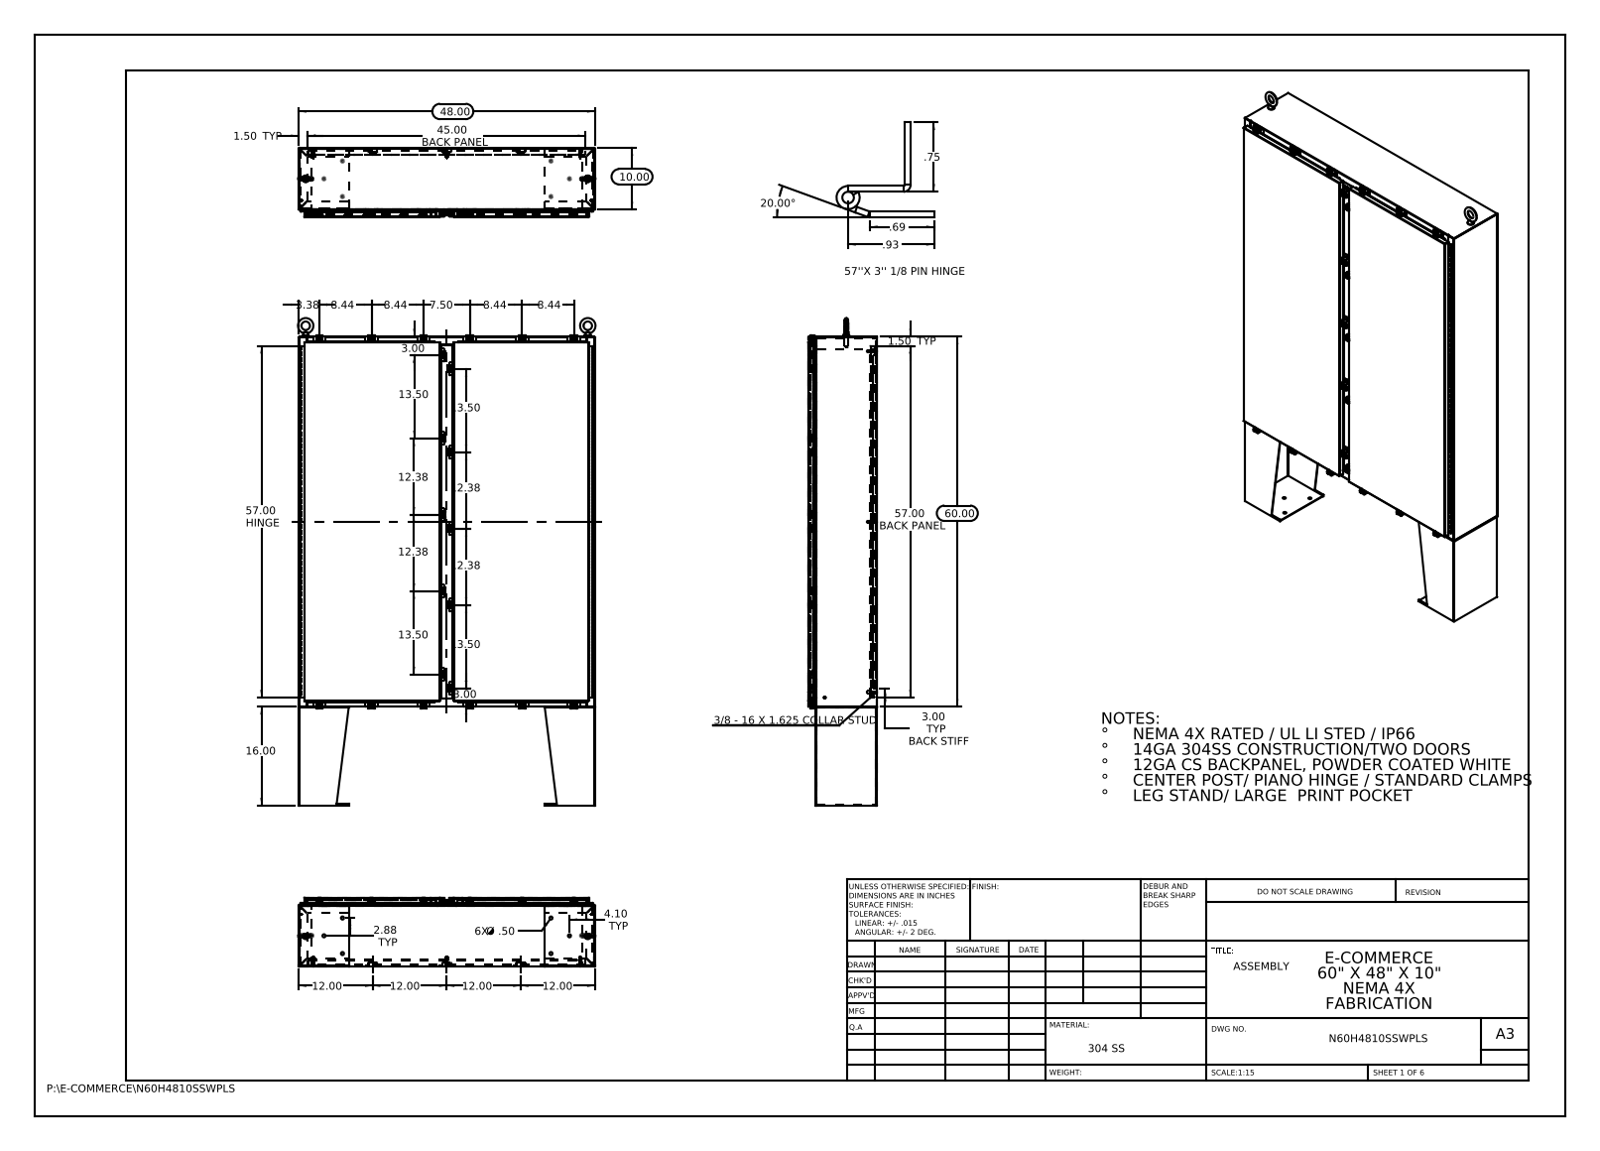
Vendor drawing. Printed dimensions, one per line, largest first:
60.00
57.00 HINGE
57.00 BACK PANEL
48.00
45.00 BACK PANEL
20.00°
16.00
13.50
13.50
13.50
13.50
12.38
12.38
12.38
12.38
12.00
12.00
12.00
12.00
10.00
8.44
8.44
8.44
8.44
7.50
4.10 TYP
3.38
3.00
3.00
3.00 TYP BACK STIFF
2.88 TYP
1.50 TYP
1.50 TYP
.93
.75
.69
6X Ø .50
